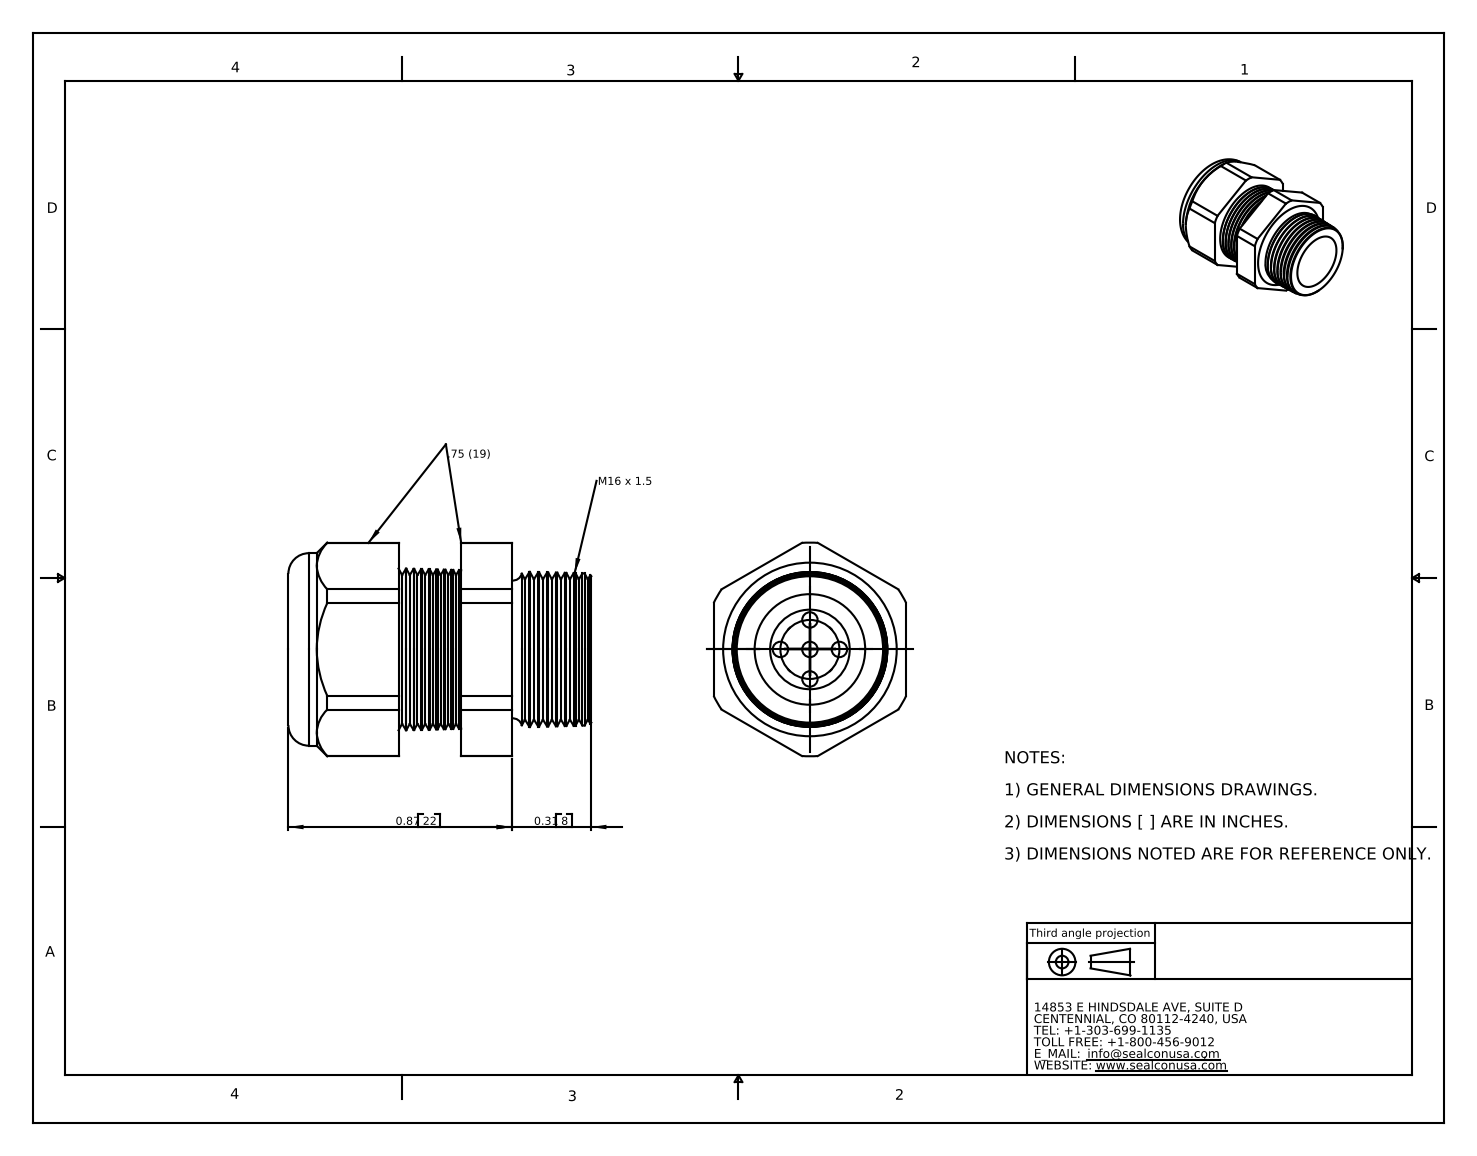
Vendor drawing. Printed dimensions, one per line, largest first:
0.87 22
0.31 8
